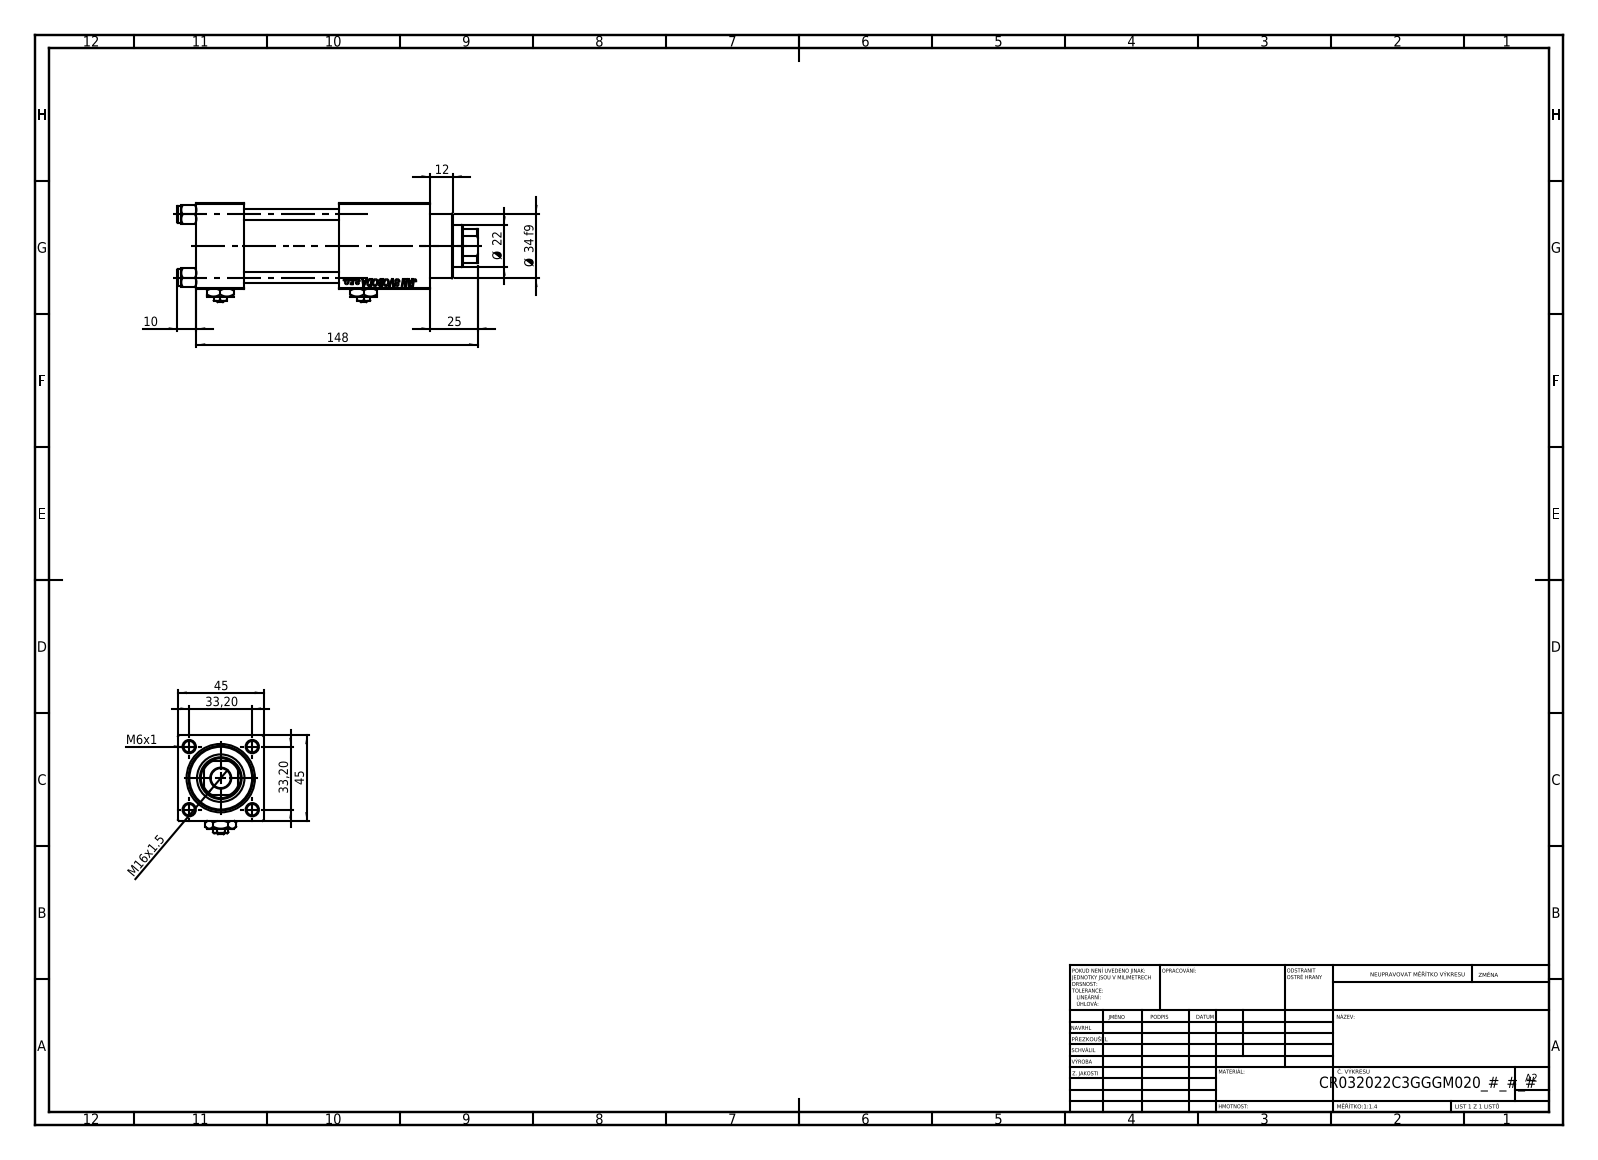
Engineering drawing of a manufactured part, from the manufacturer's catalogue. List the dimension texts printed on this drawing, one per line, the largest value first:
148
45
45
Ø 34 f9
33,20
33,20
25
Ø 22
M16x1.5
12
10
M6x1
